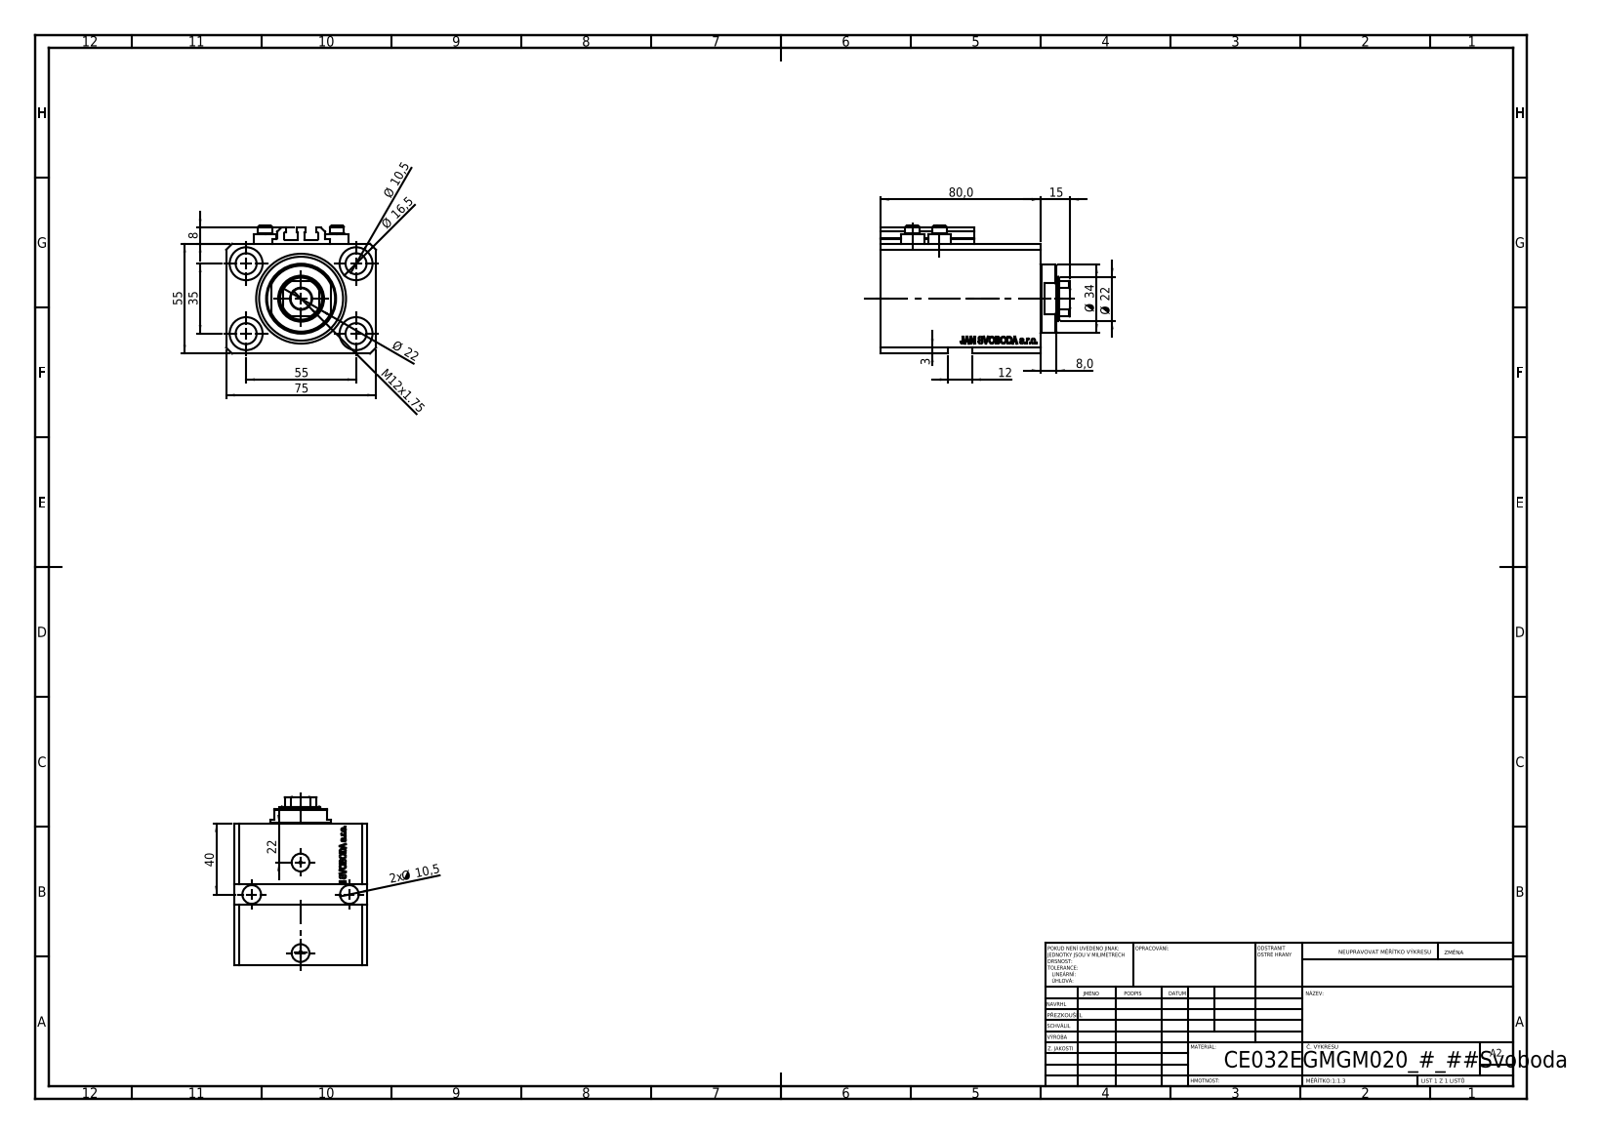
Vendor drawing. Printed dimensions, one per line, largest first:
80,0
75
55
55
40
35
Ø 34
Ø 22
Ø 22
22
Ø 16,5
15
M12x1.75
12
Ø 10,5
2x Ø 10,5
8
8,0
3
